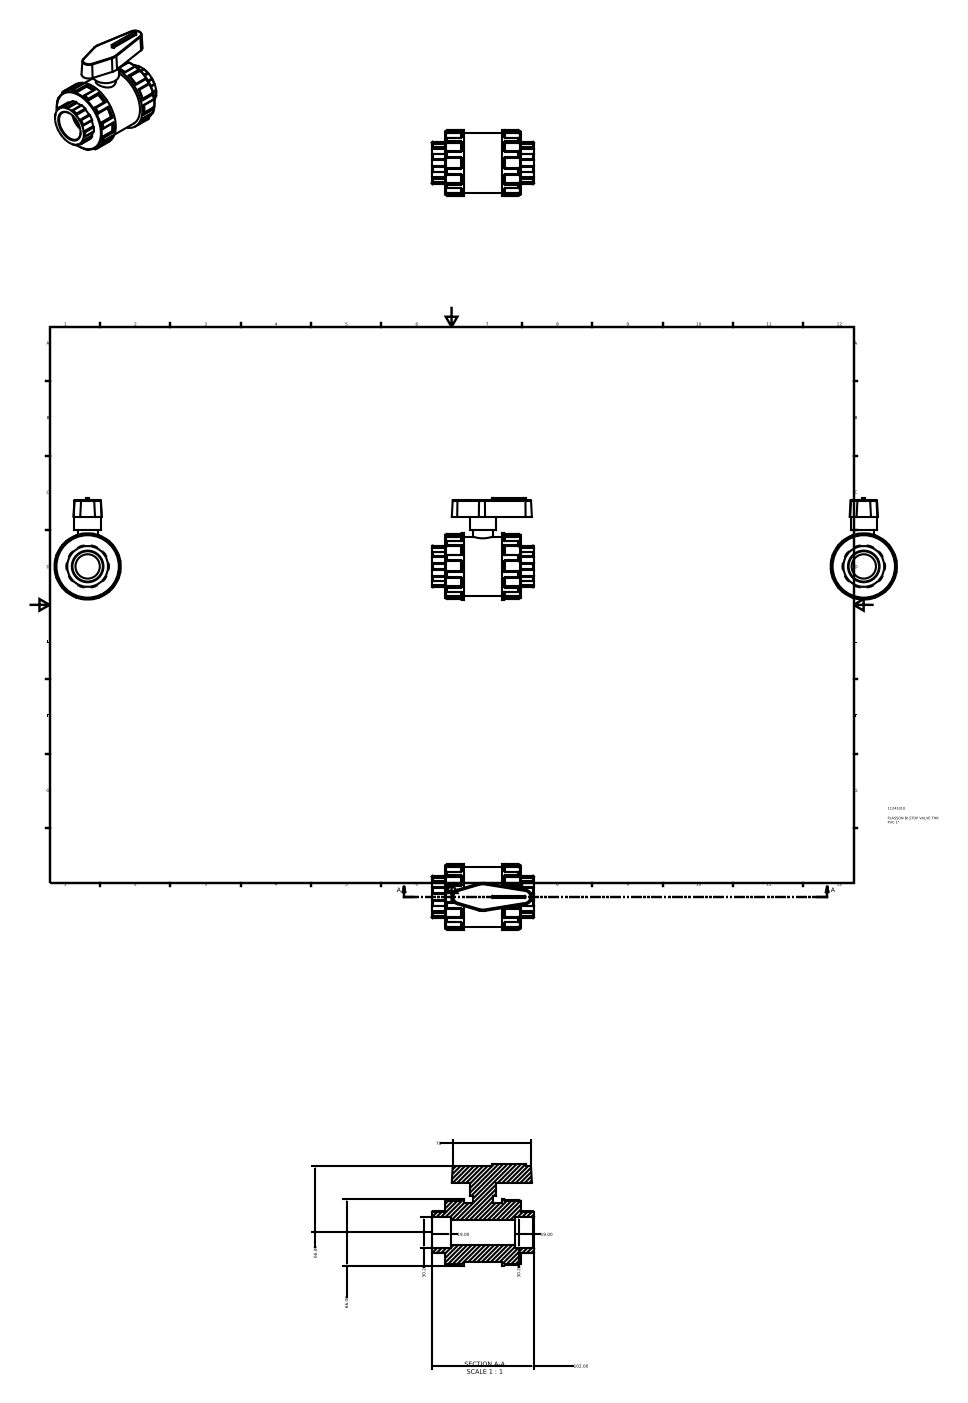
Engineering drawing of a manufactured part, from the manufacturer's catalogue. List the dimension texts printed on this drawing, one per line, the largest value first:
102.00
78
66.00
66.00
30.29
30.29
19.00
19.00
